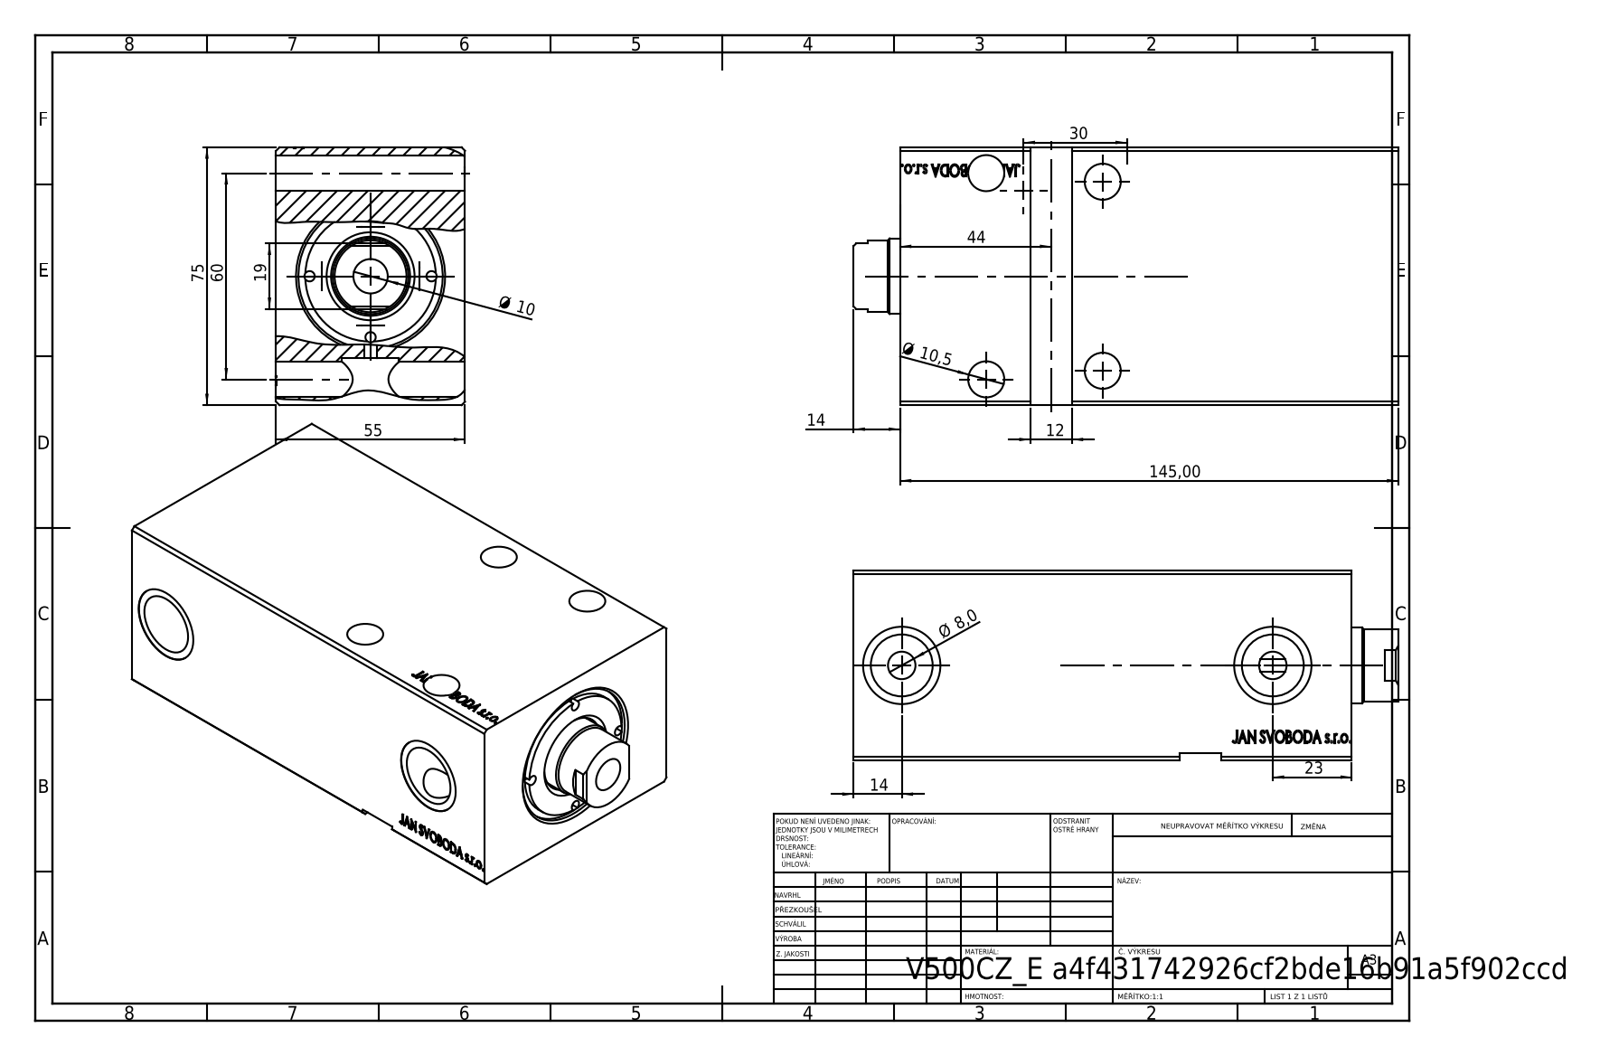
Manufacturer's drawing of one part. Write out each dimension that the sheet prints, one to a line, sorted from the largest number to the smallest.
145,00
75
60
55
44
30
23
19
14
14
12
Ø 10,5
Ø 10
Ø 8,0
